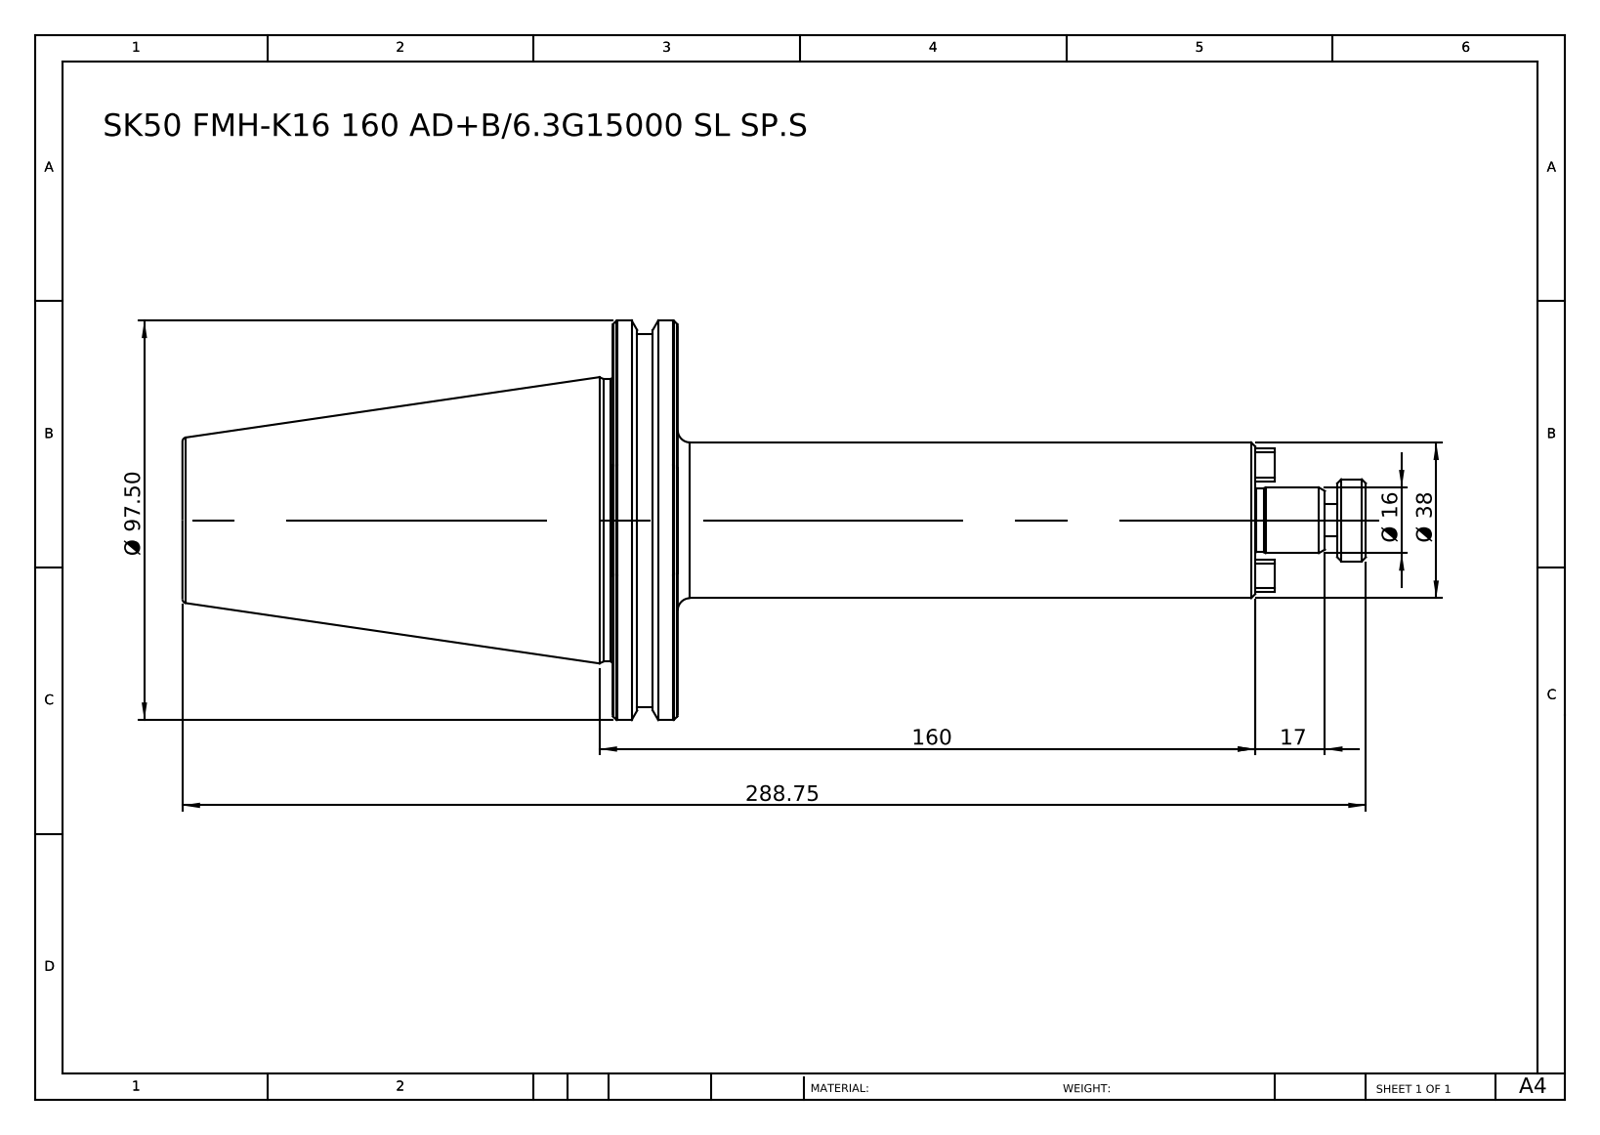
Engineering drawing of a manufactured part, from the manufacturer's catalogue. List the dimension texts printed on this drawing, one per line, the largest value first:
288.75
160
Ø 97.50
Ø 38
17
Ø 16
